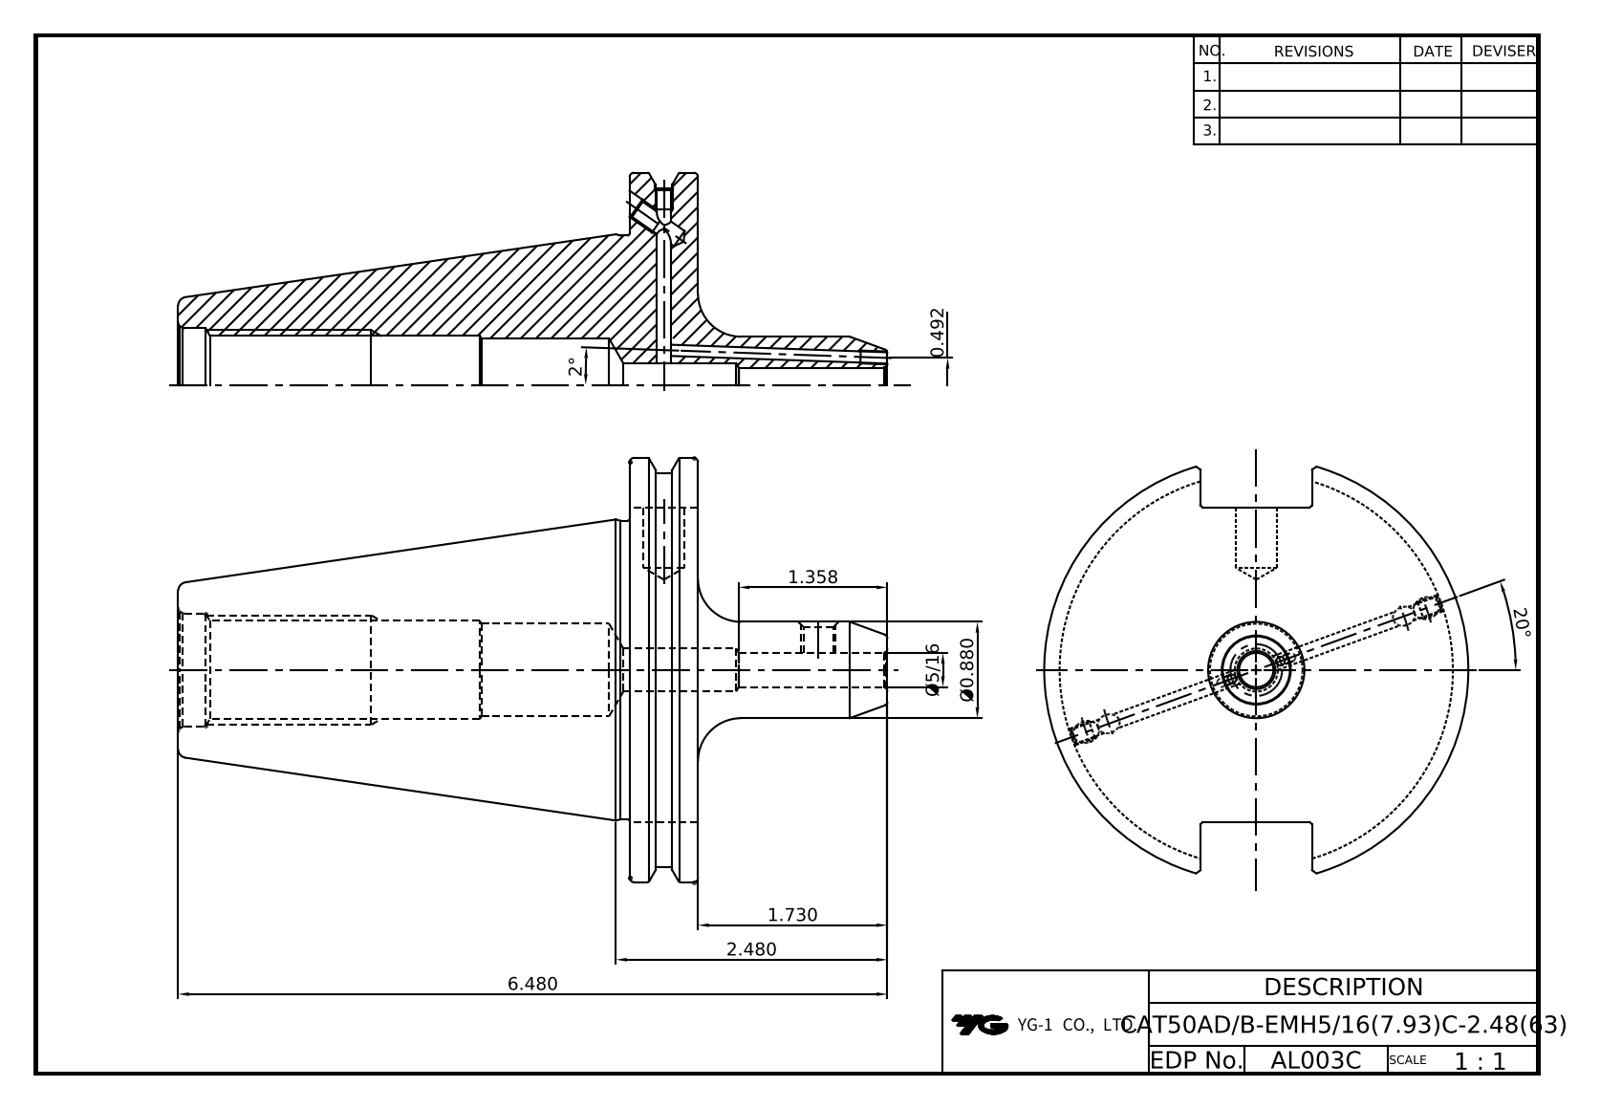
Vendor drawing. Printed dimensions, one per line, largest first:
20°
6.480
2.480
2°
1.730
1.358
Ø0.880
Ø5/16
